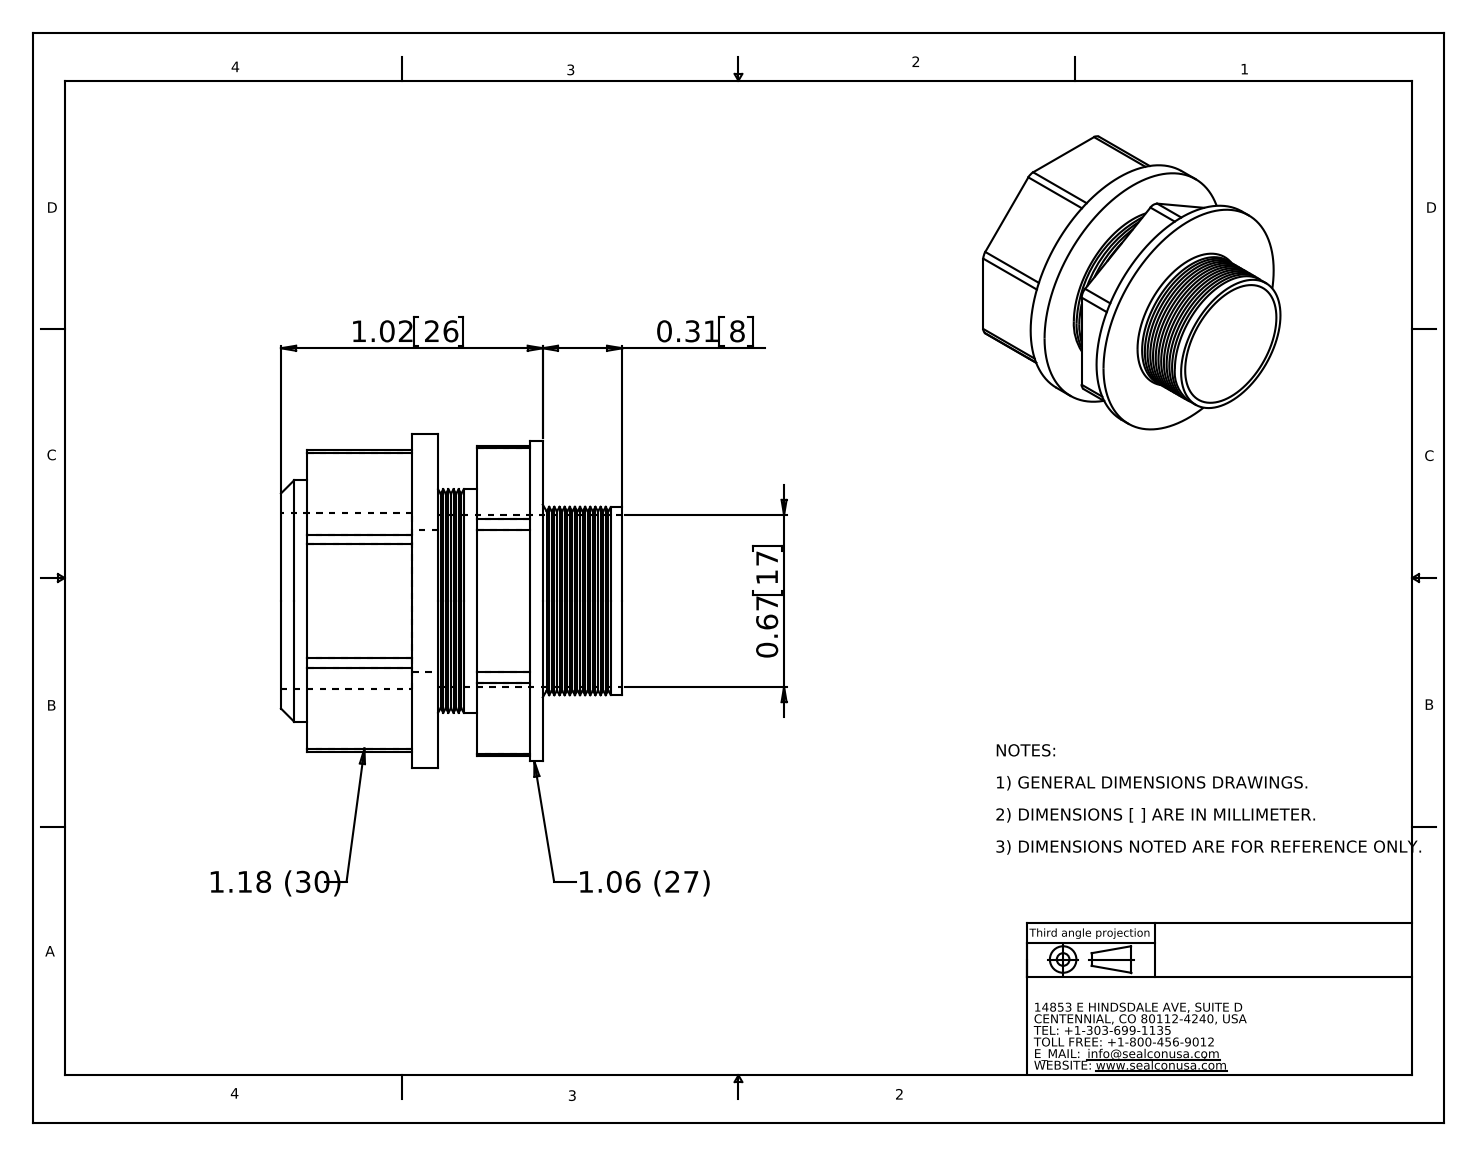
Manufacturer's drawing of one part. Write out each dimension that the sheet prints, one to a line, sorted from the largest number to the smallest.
1.02 26
0.67 17
0.31 8
